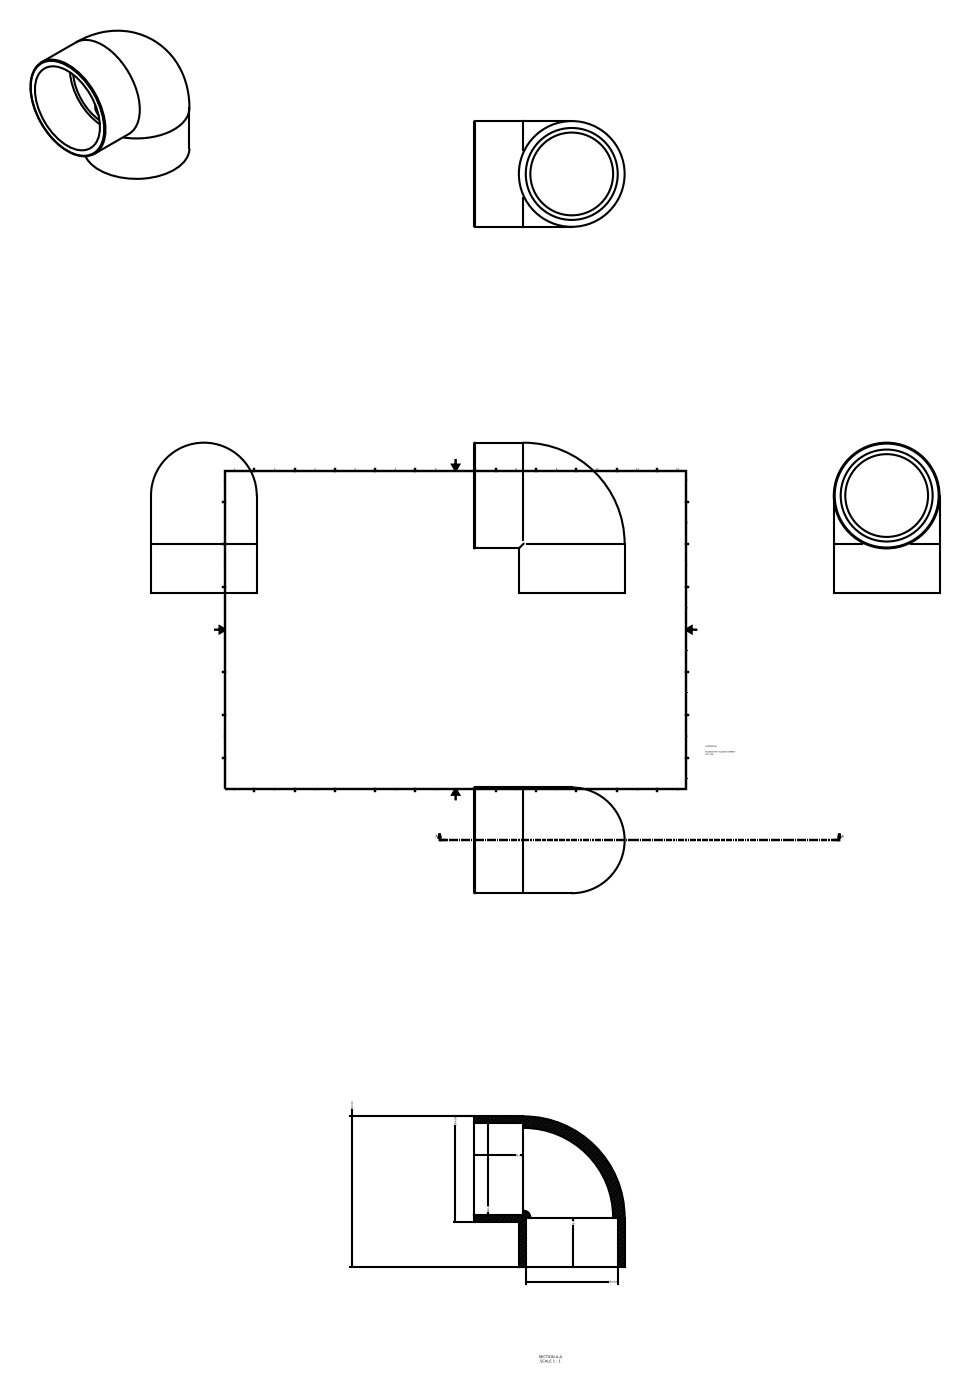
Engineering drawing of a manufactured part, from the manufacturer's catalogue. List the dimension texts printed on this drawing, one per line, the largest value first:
262.00
184.00
160.00
160.00
86.00
86.00
